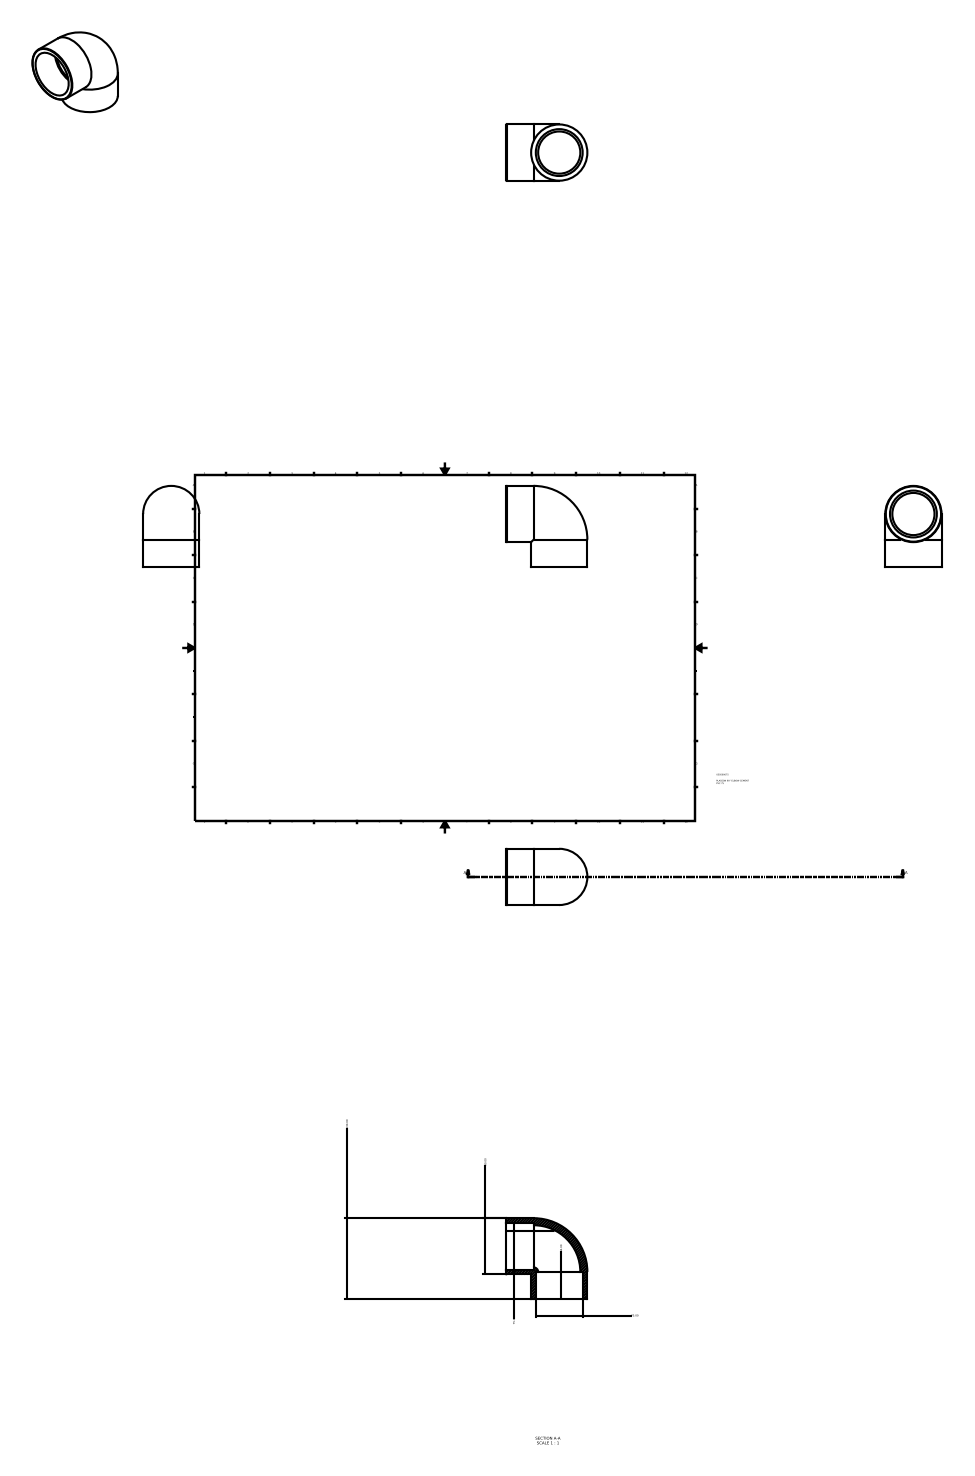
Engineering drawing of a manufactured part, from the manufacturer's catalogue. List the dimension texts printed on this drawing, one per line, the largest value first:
130.00
90.00
75.00
75.00
44.00
44.00
